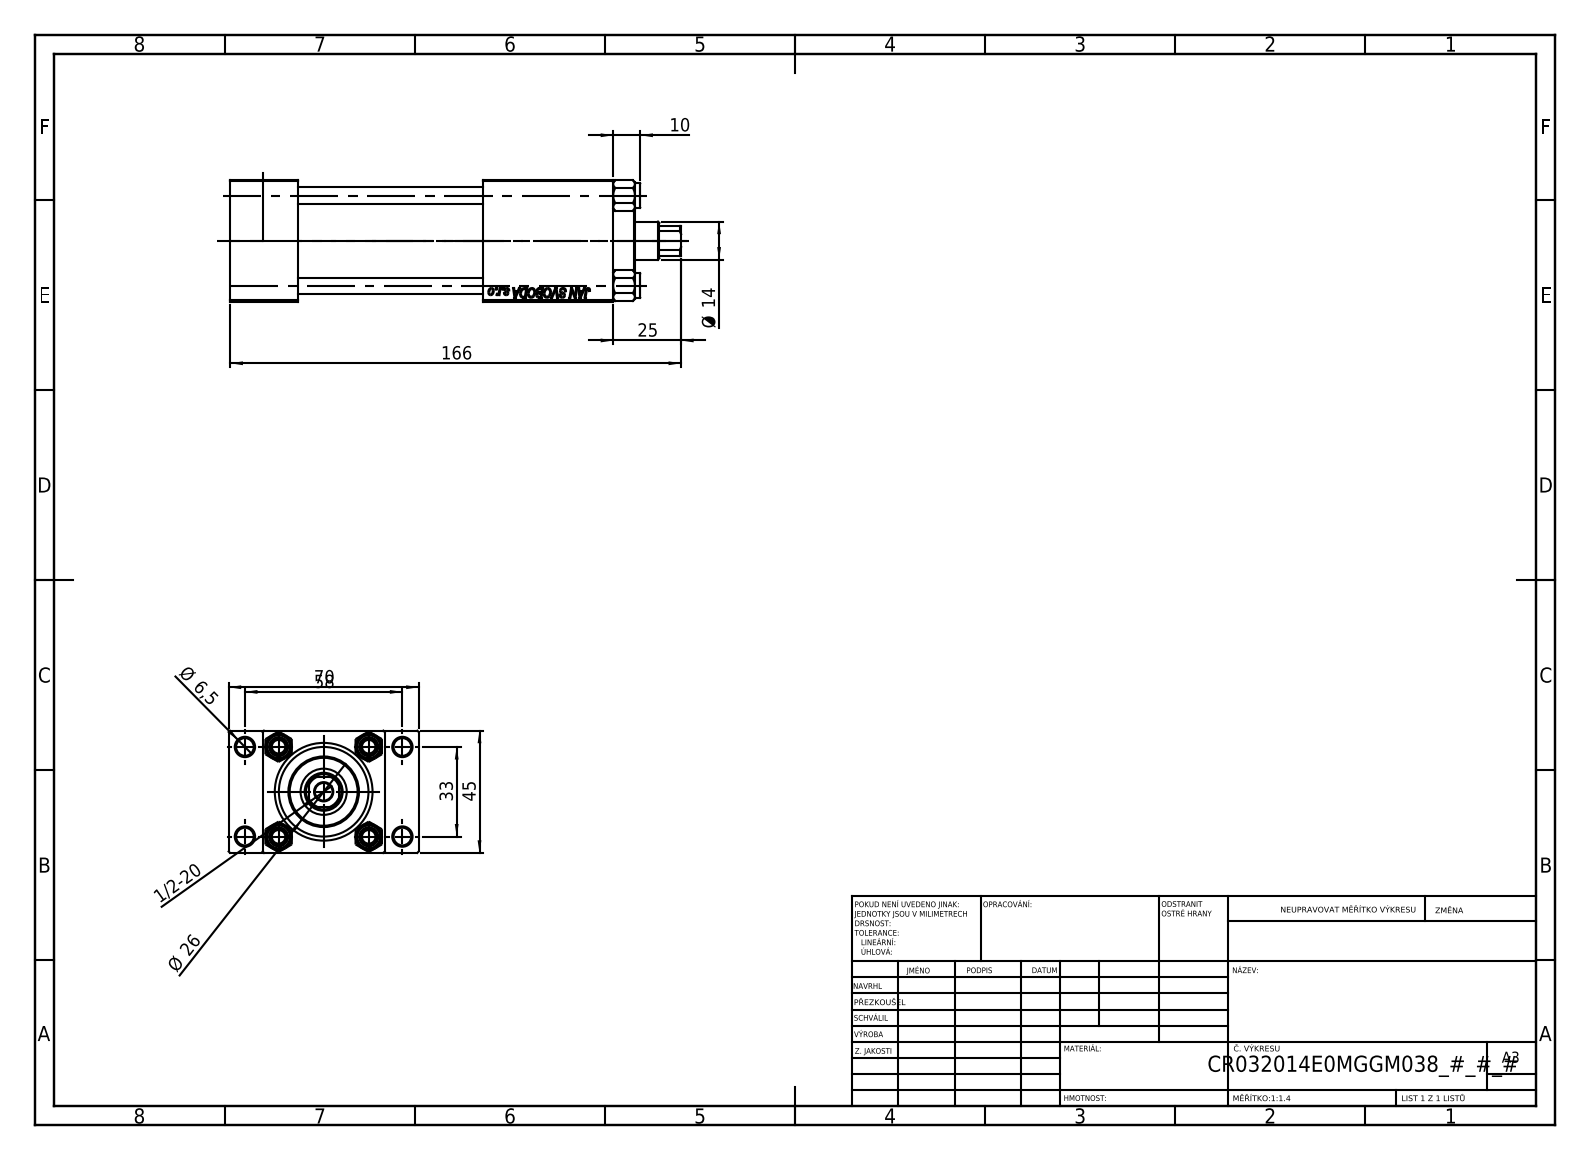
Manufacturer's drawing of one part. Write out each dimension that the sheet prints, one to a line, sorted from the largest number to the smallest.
166
70
58
45
33
Ø 26
25
Ø 14
10
Ø 6,5
1/2-20
